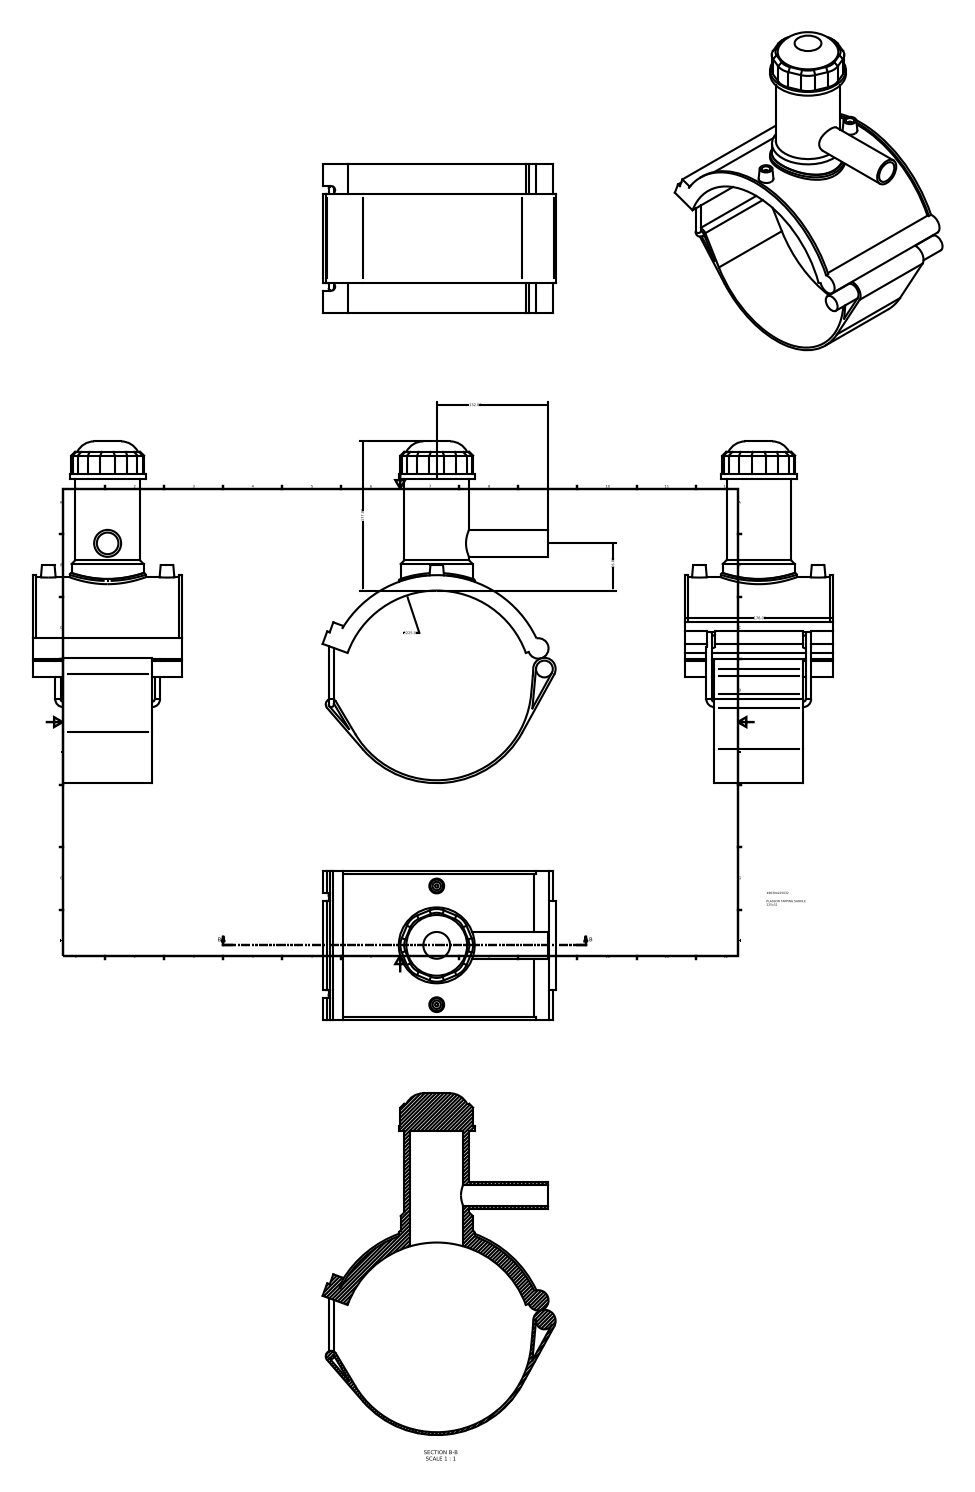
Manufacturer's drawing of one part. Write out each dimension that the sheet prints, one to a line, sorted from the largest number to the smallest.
∅225.00
177.00
176.00
132.00
56.00
